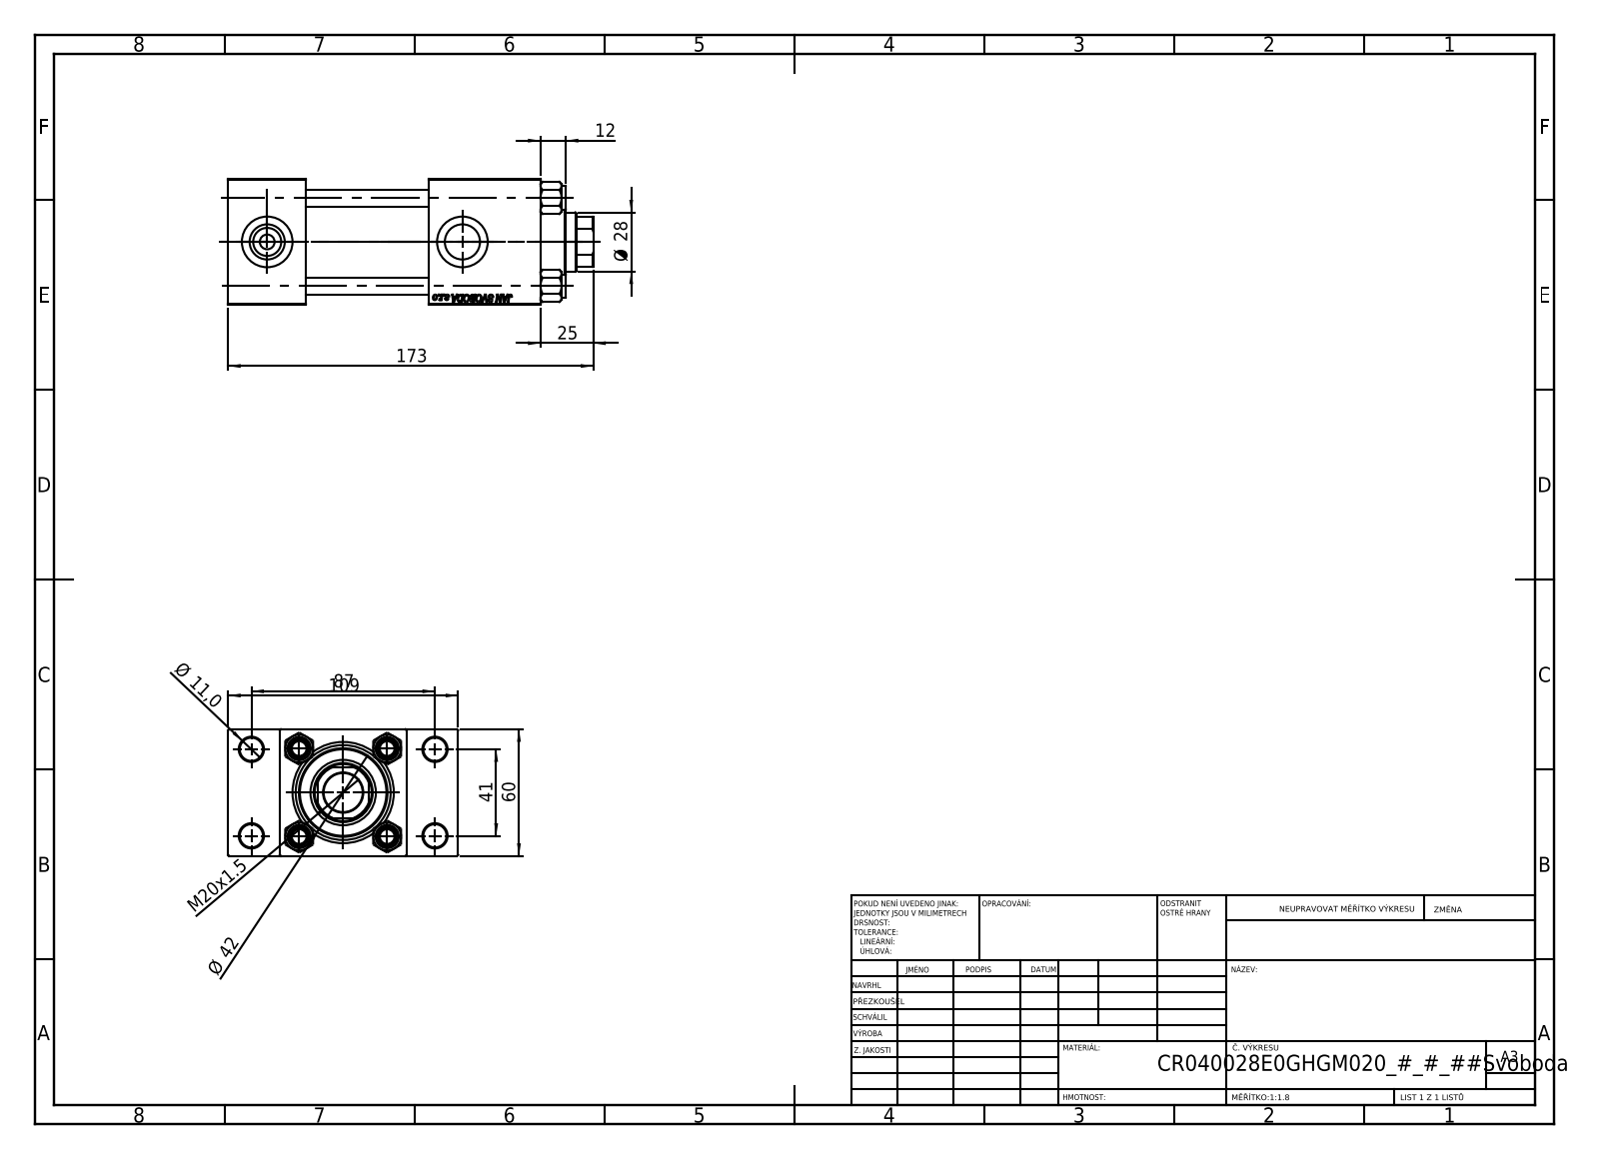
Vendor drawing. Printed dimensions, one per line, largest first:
173
109
87
60
Ø 42
41
Ø 28
25
M20x1.5
12
Ø 11,0
